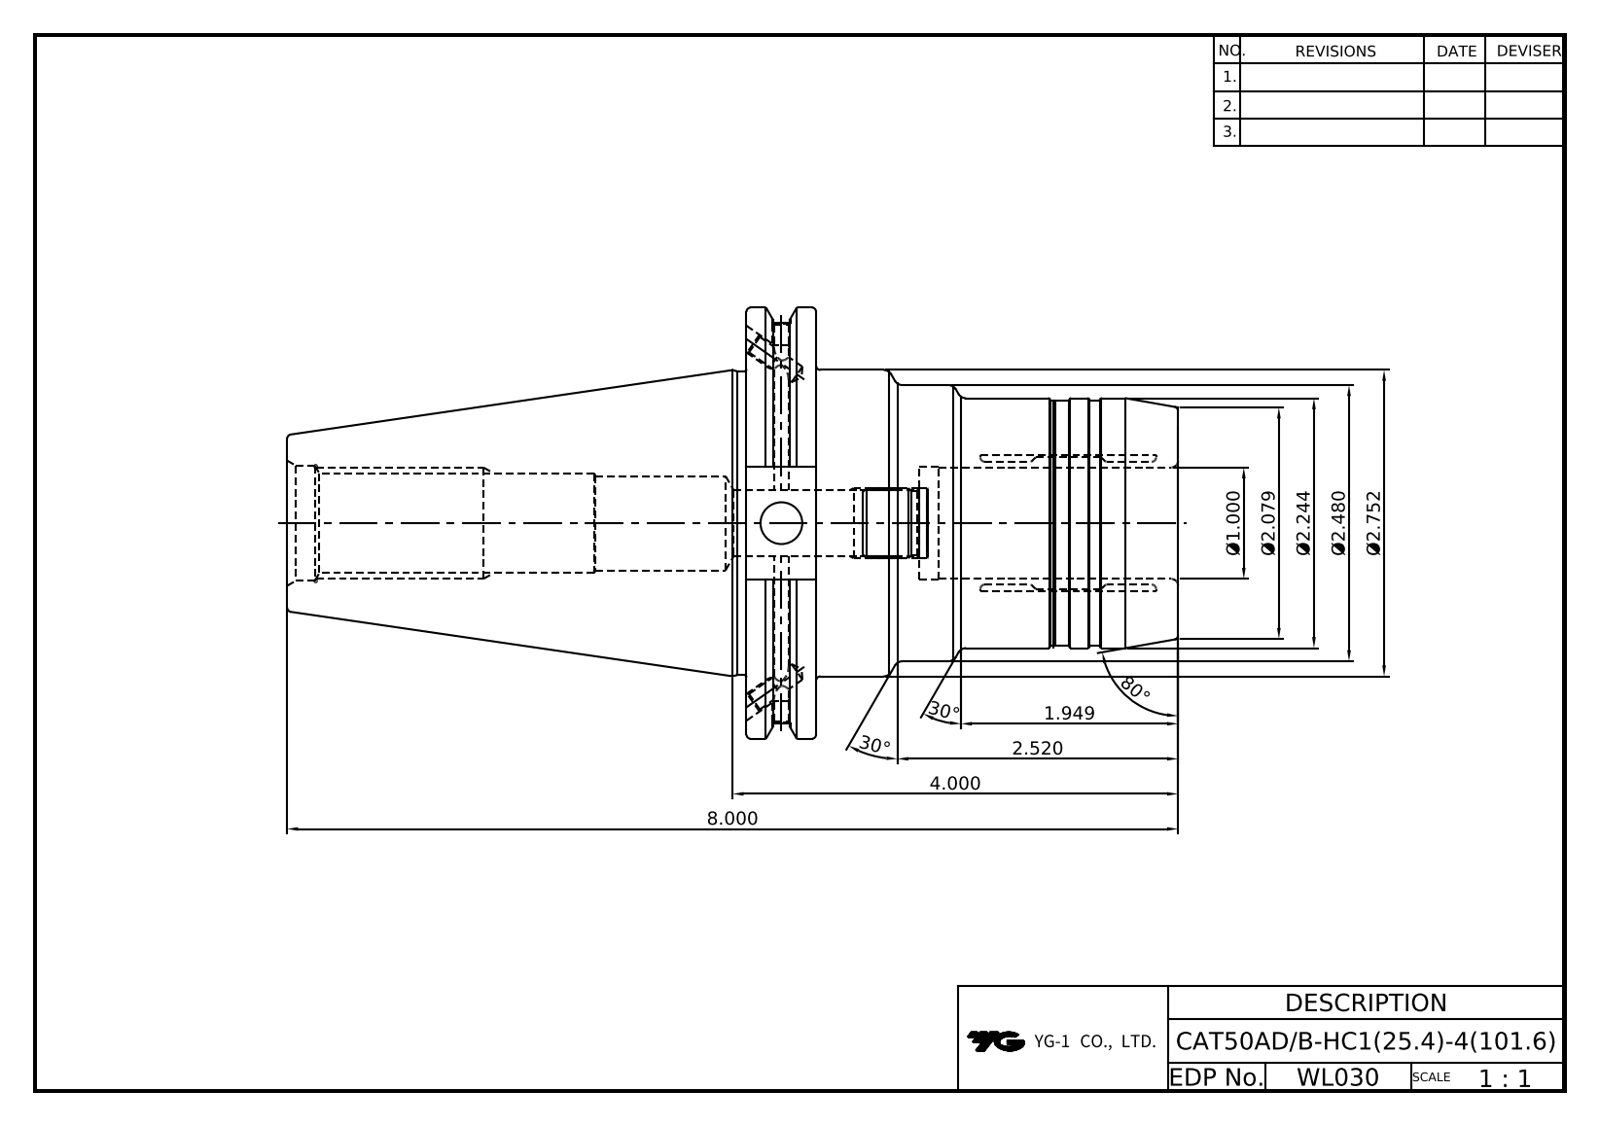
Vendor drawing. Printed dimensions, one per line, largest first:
80°
30°
30°
8.000
4.000
Ø2.752
2.520
Ø2.480
Ø2.244
Ø2.079
1.949
Ø1.000
